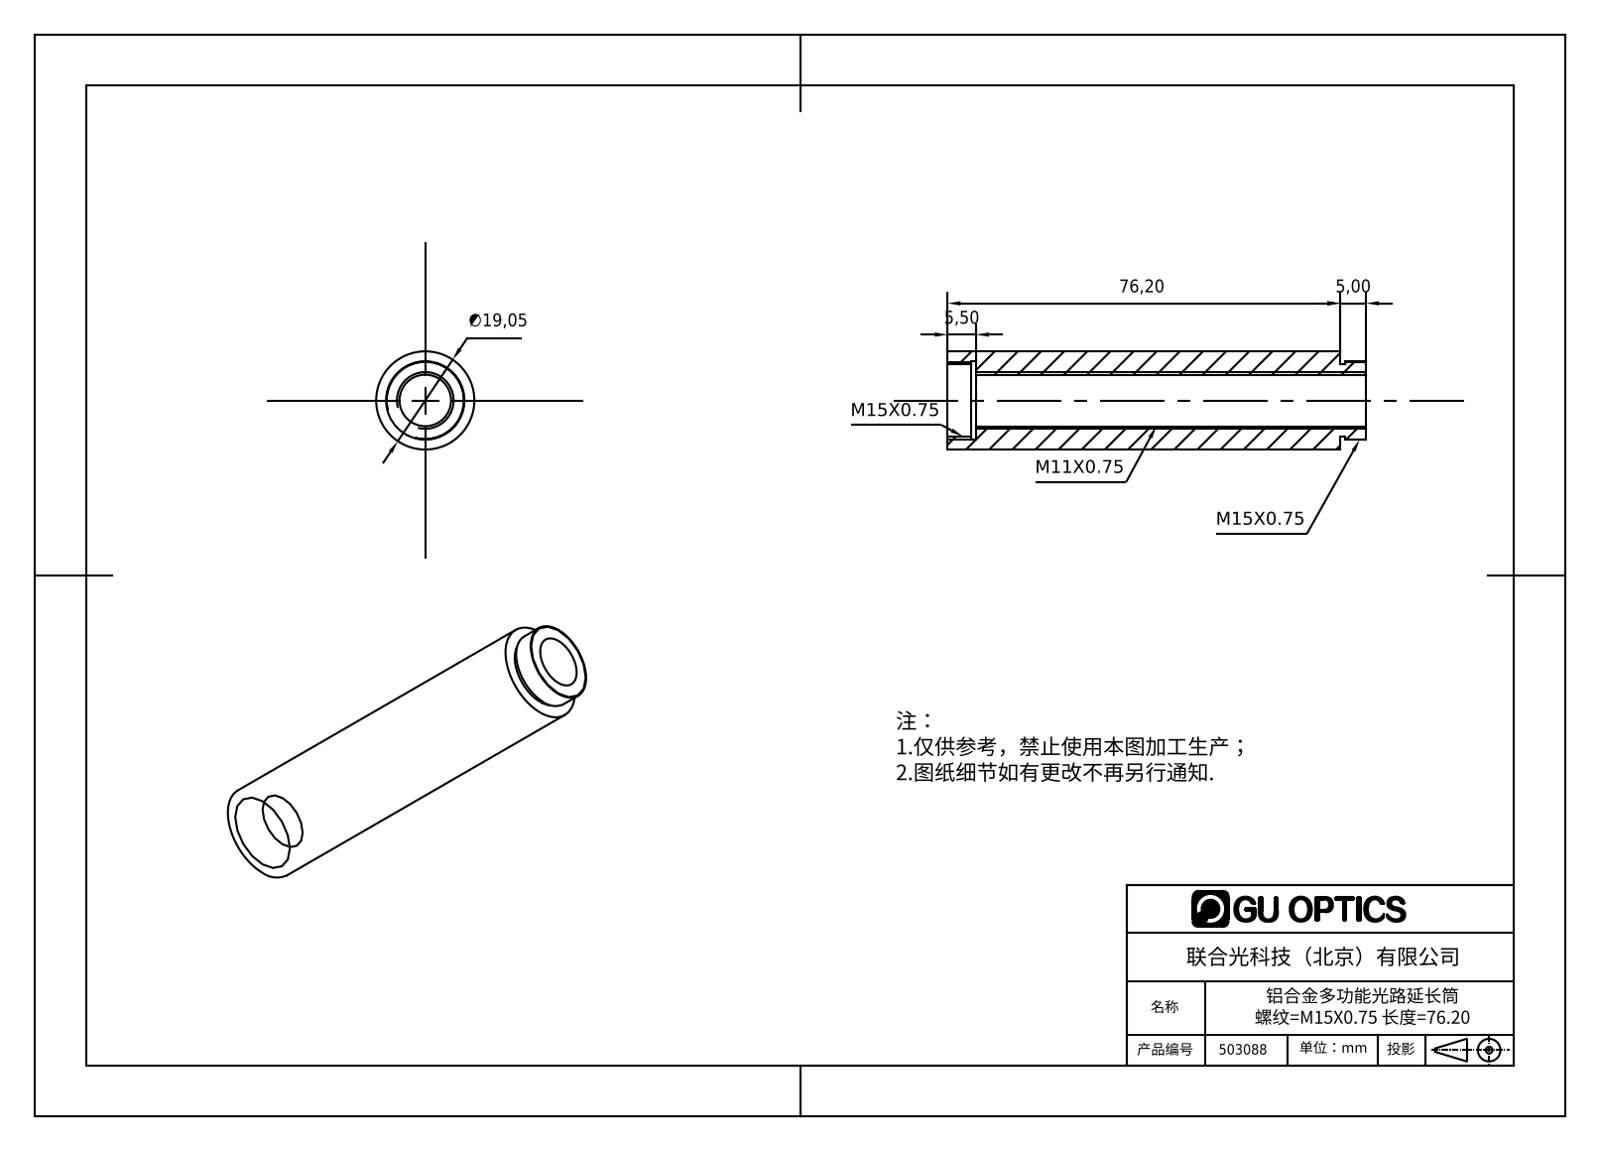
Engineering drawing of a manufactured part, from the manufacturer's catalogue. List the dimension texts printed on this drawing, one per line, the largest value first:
76,20
∅19,05
5,50
5,00
